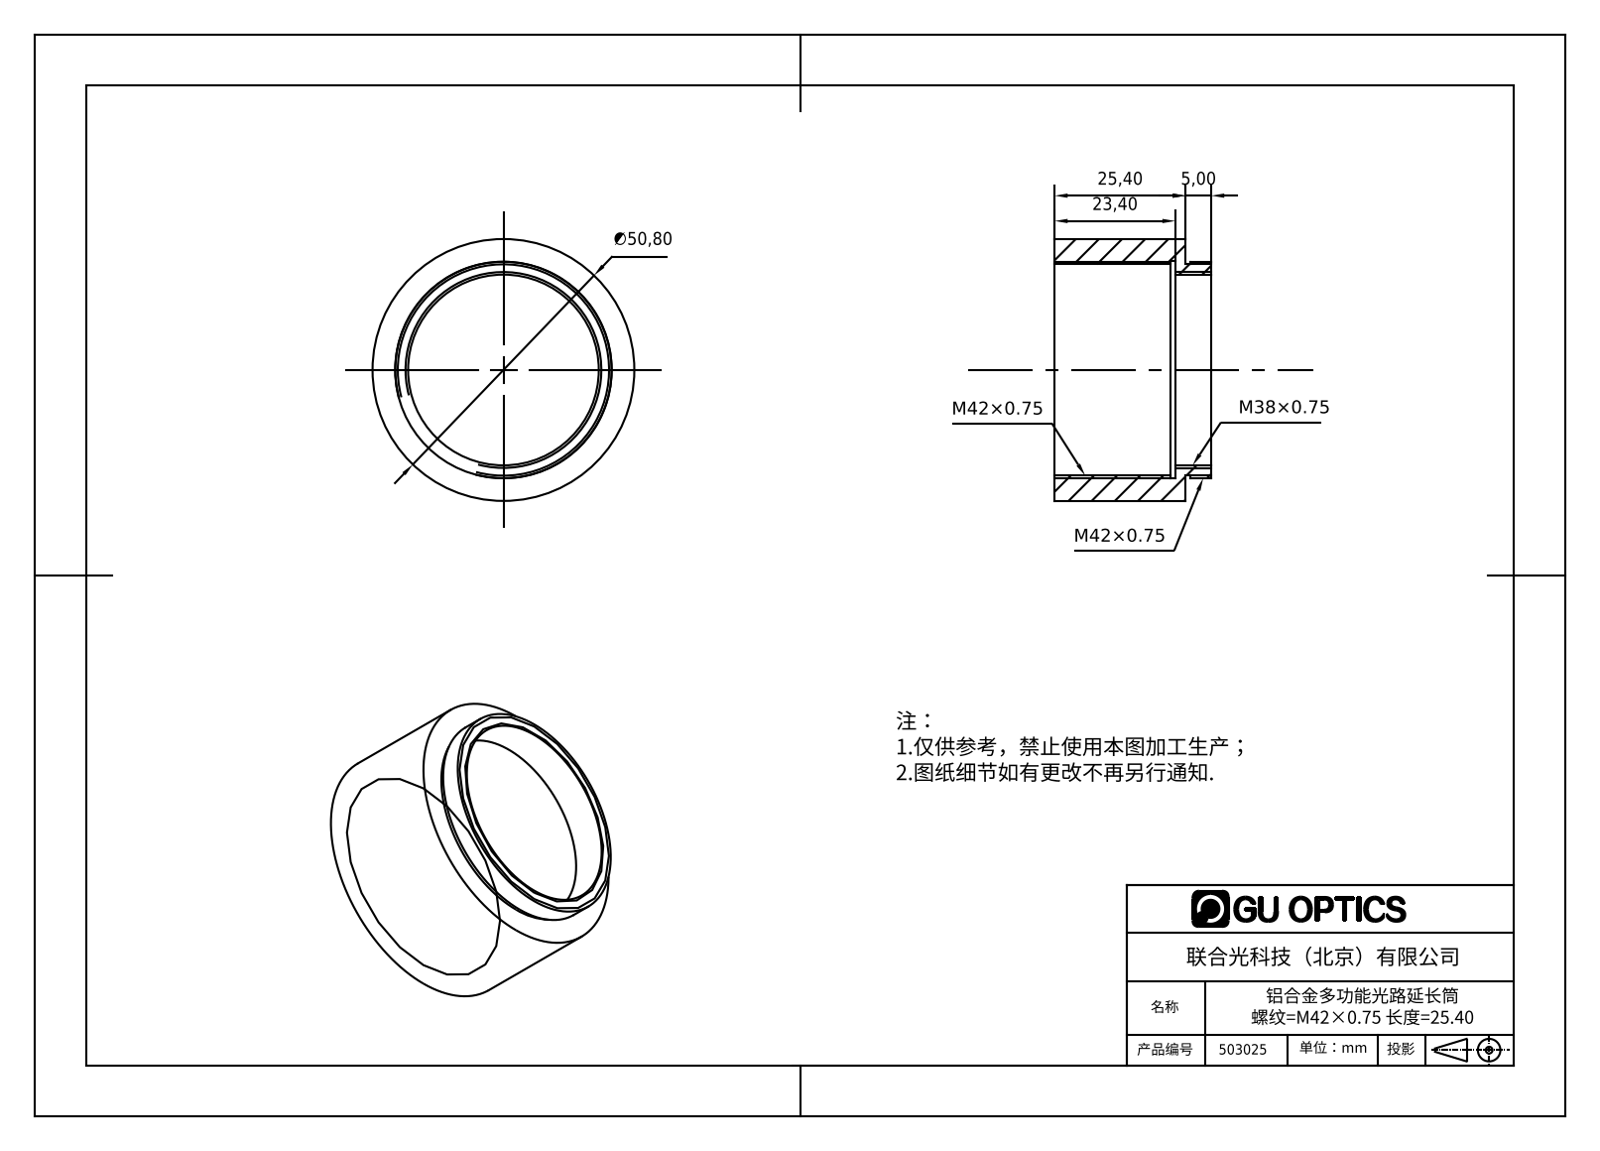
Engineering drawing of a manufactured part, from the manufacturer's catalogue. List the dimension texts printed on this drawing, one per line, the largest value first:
∅50,80
25,40
23,40
5,00
